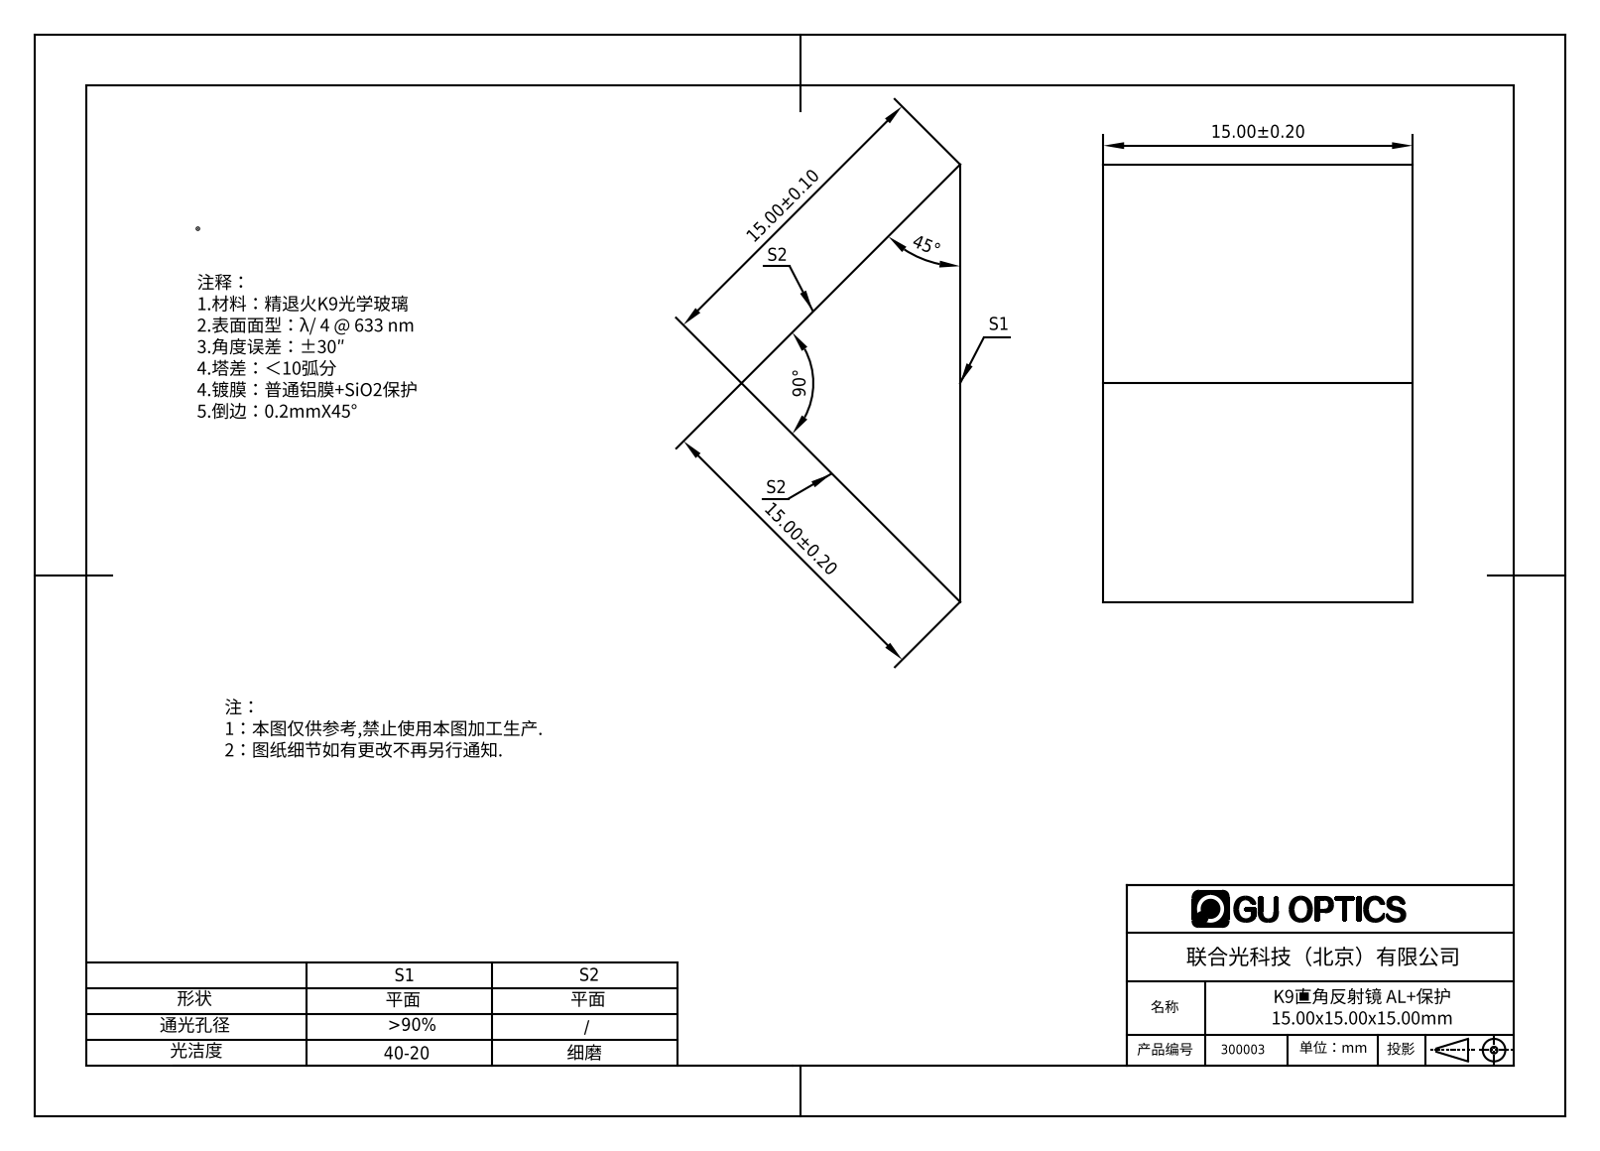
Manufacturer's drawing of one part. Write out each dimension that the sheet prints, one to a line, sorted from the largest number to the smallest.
90°
45°
15.00±0.10
15.00±0.20
15.00±0.20
